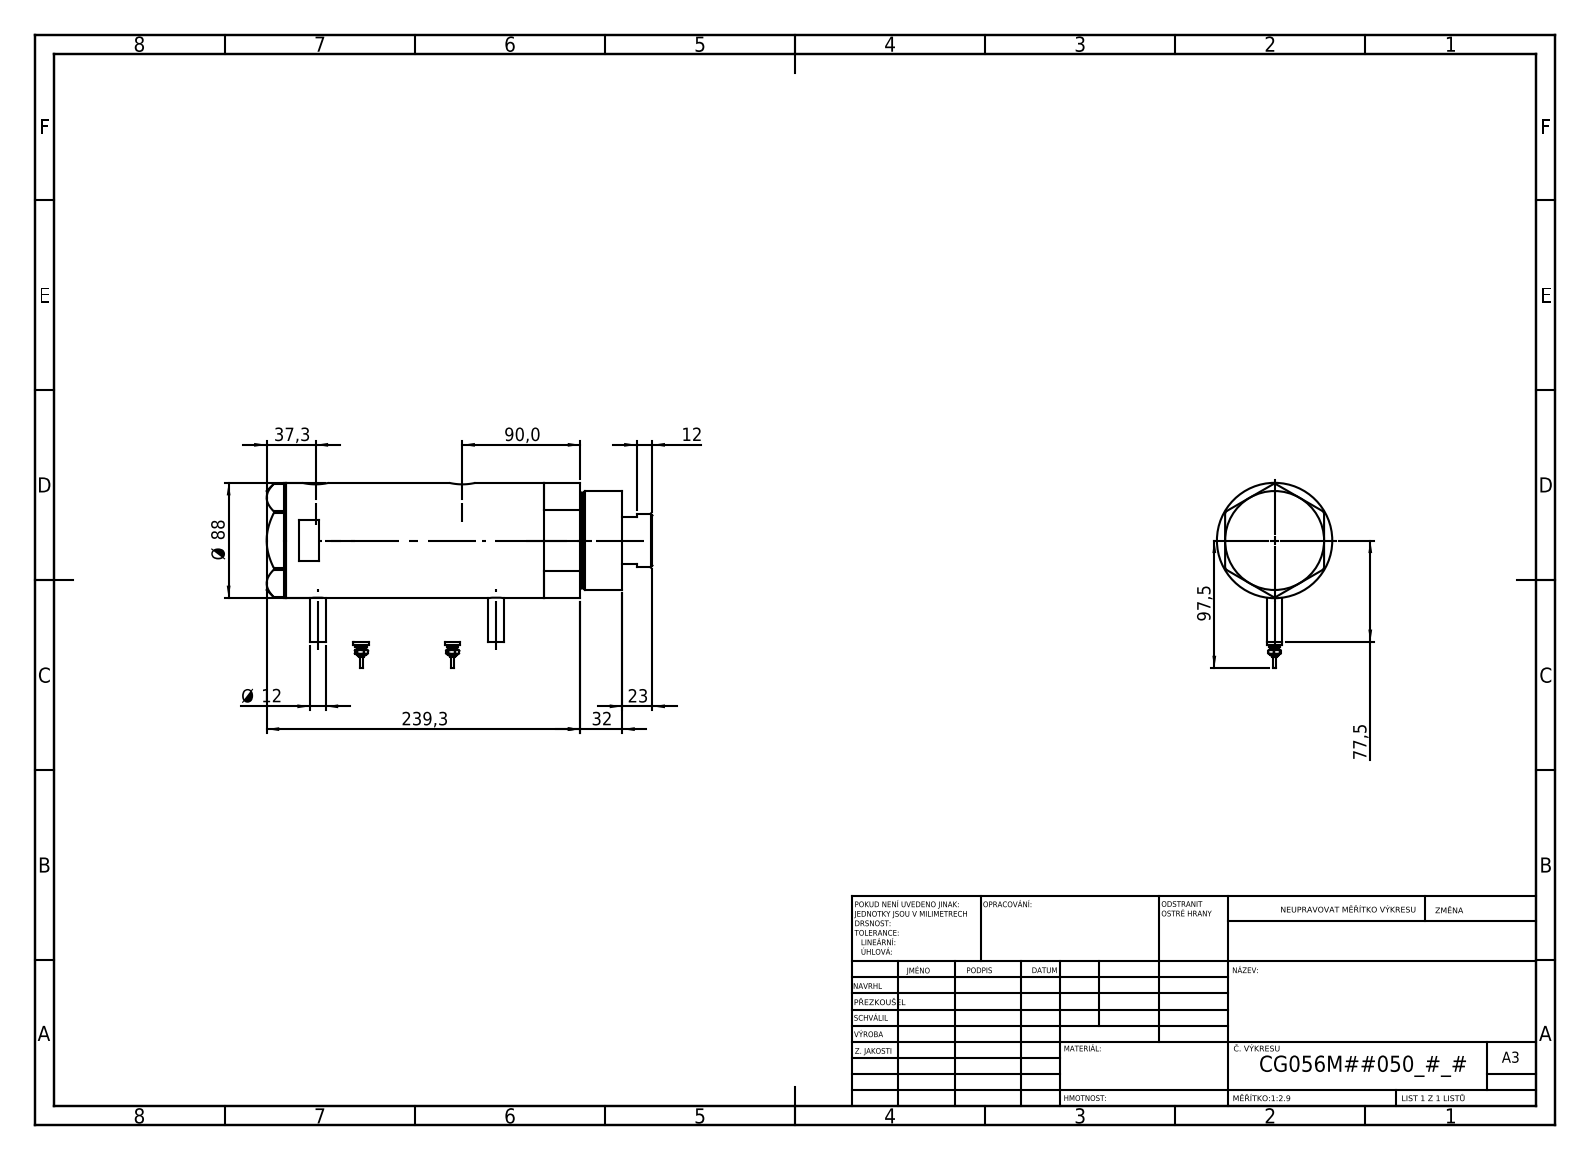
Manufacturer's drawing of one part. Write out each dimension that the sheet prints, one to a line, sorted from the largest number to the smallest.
239,3
97,5
90,0
Ø 88
77,5
37,3
32
23
12
Ø 12
